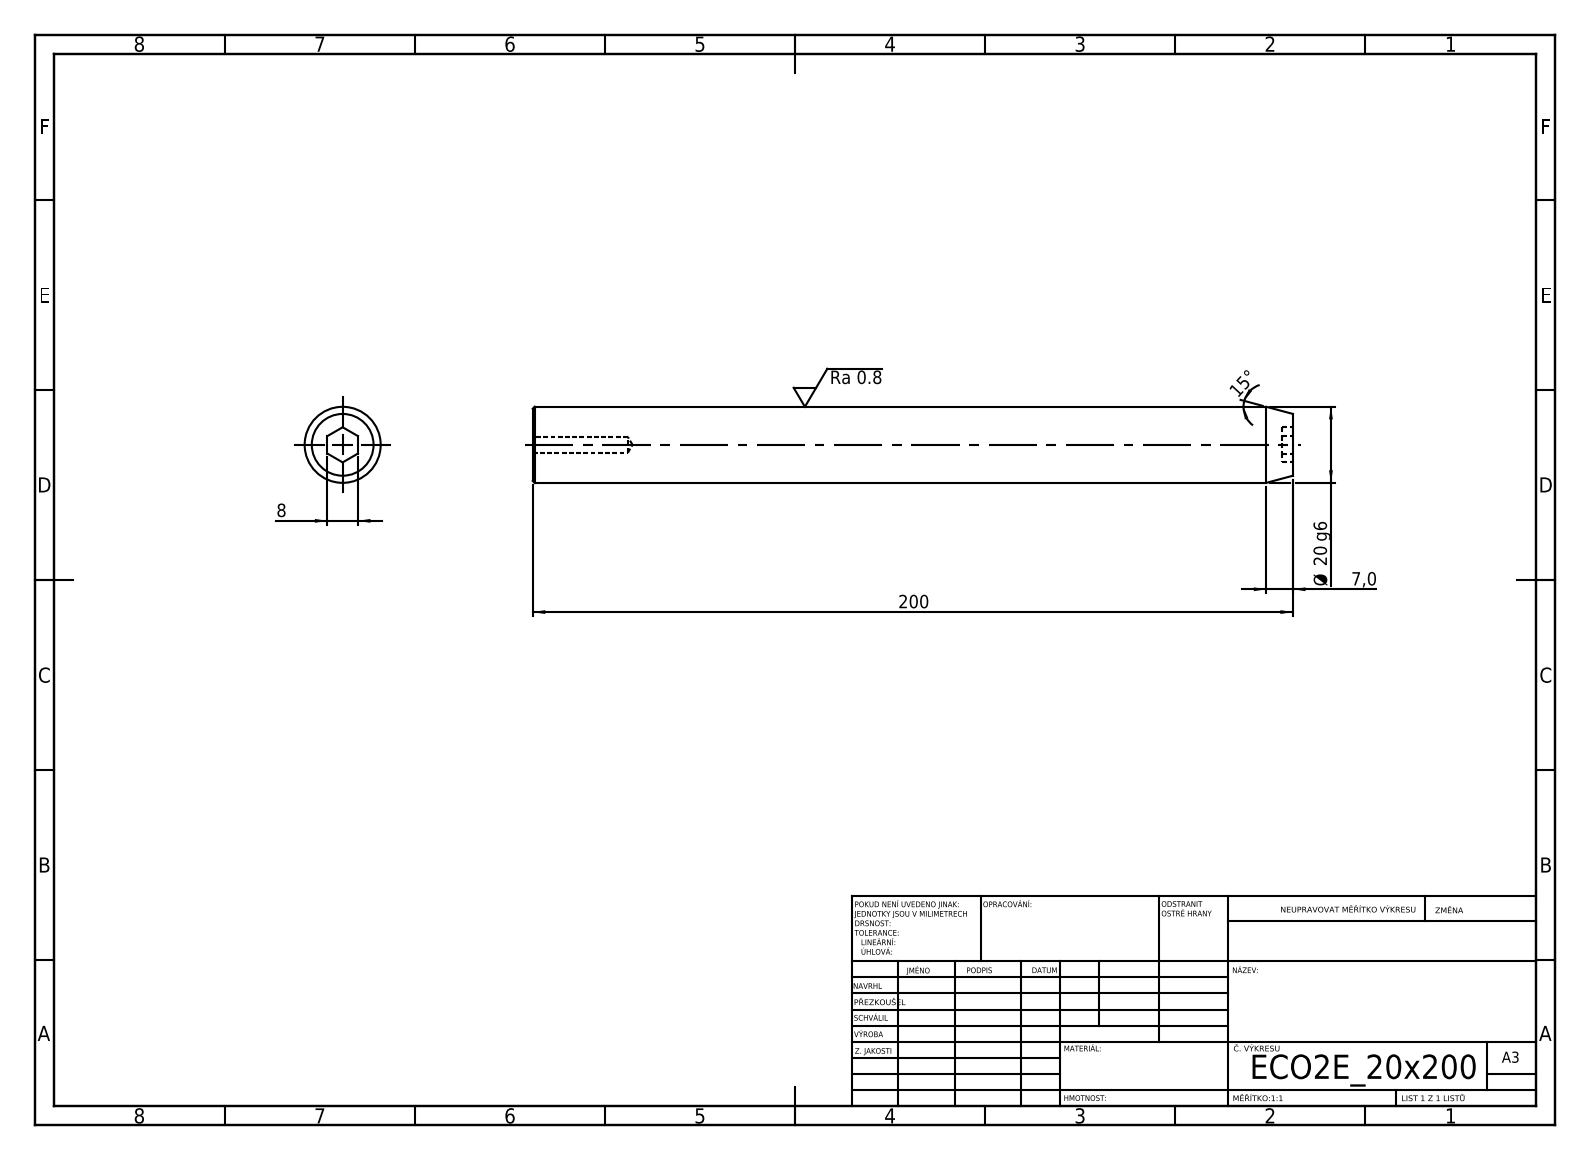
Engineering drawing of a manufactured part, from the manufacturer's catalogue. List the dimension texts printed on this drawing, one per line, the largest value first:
200
Ø 20 g6
15°
8
7,0
